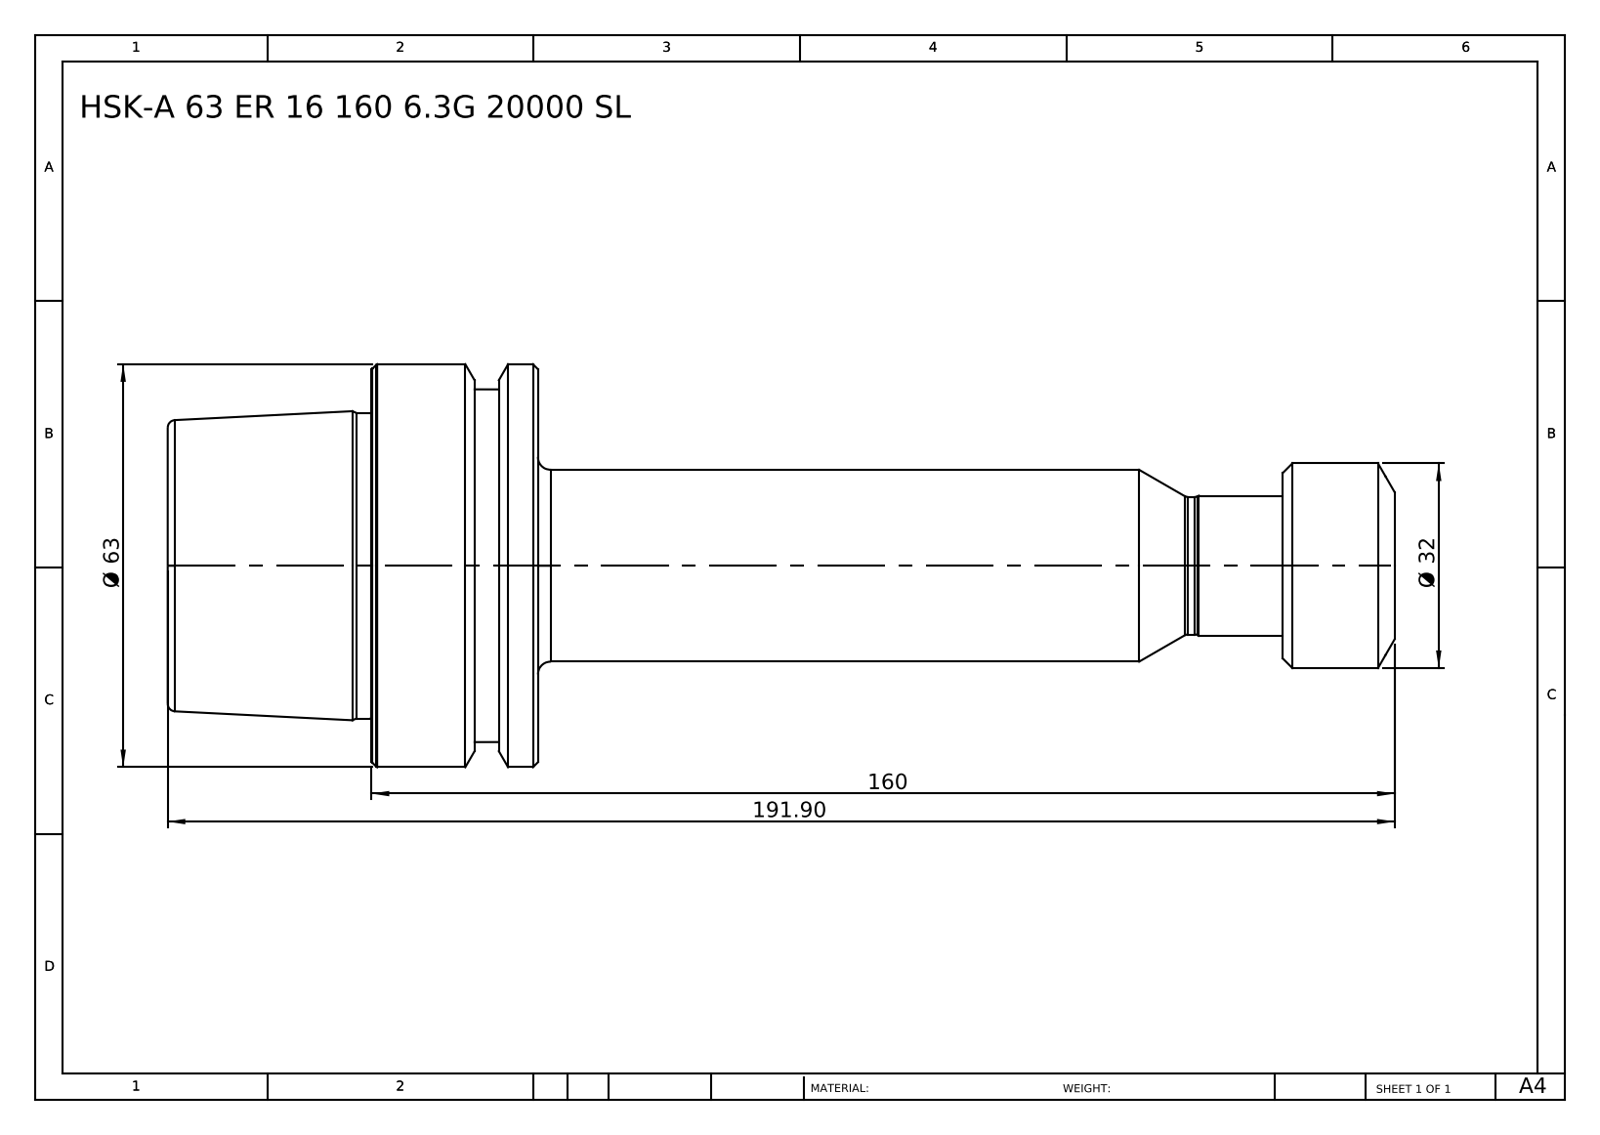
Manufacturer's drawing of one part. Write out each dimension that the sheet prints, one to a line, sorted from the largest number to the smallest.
191.90
160
Ø 63
Ø 32
